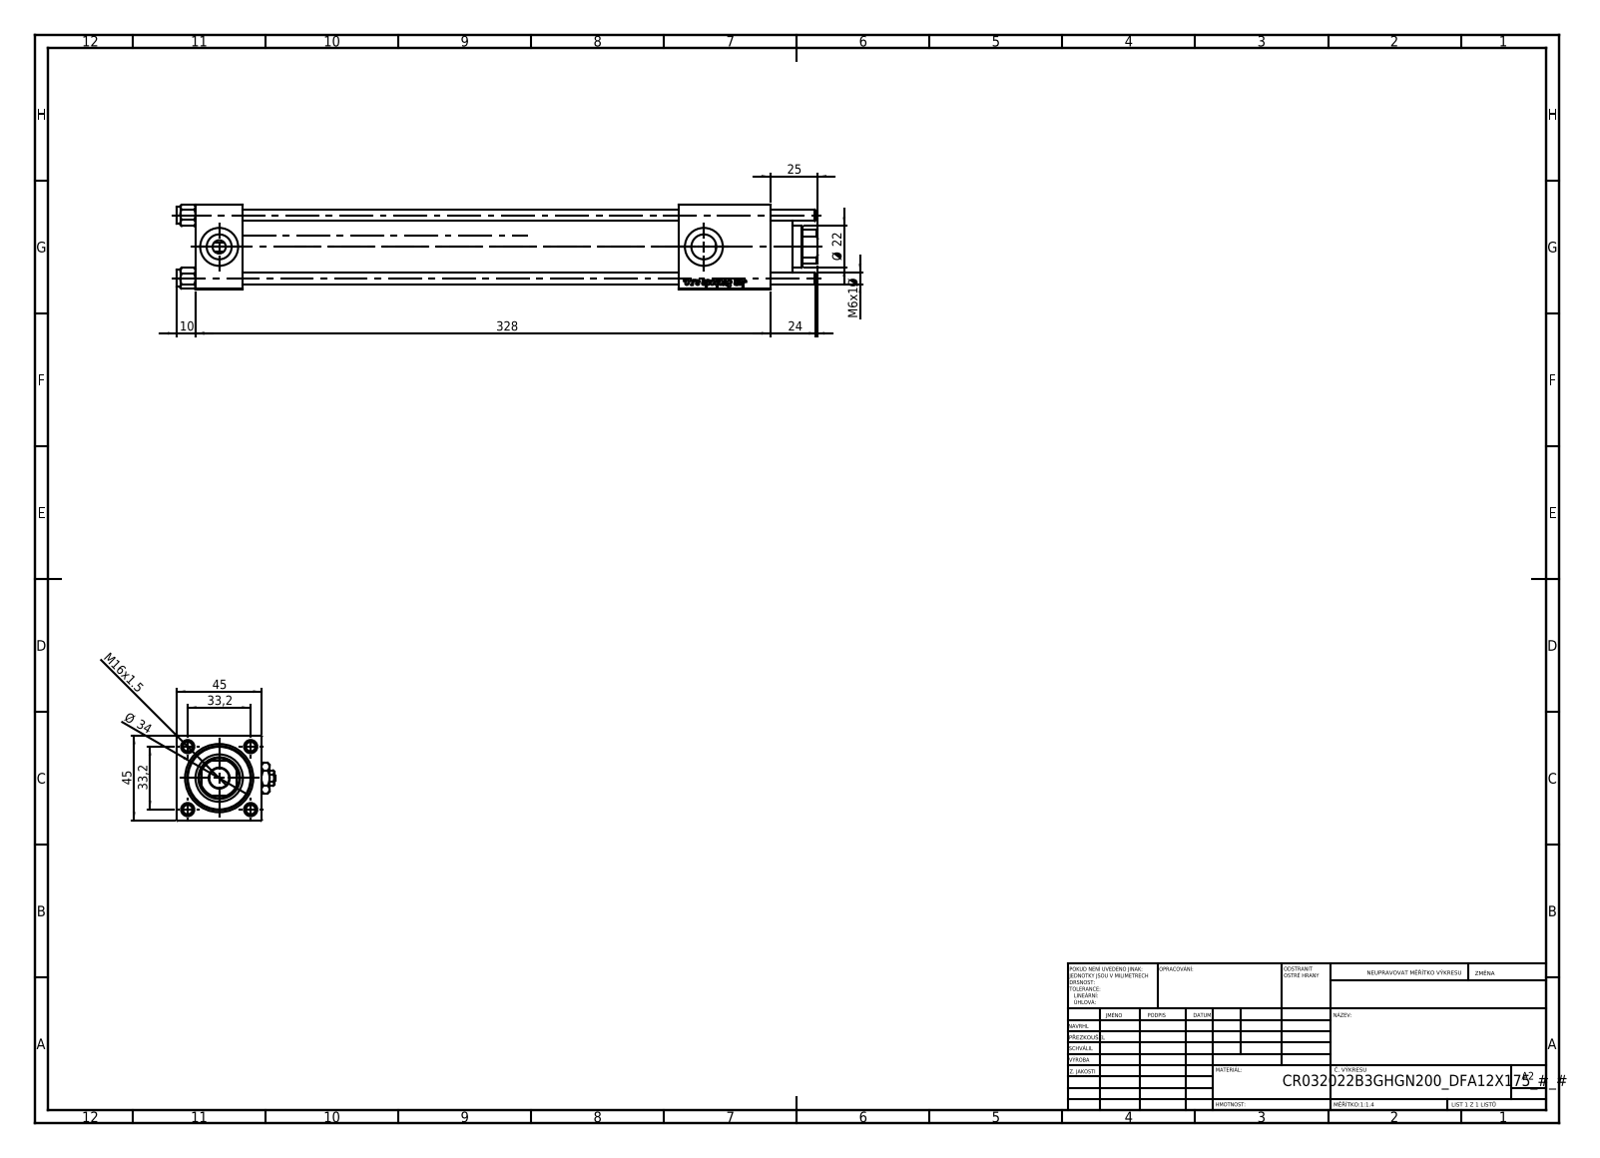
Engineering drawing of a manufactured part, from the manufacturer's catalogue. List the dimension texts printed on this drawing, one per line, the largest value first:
328
45
45
Ø 34
33,2
33,2
25
24
Ø 22
M16x1.5
10
M6x1 Ø
